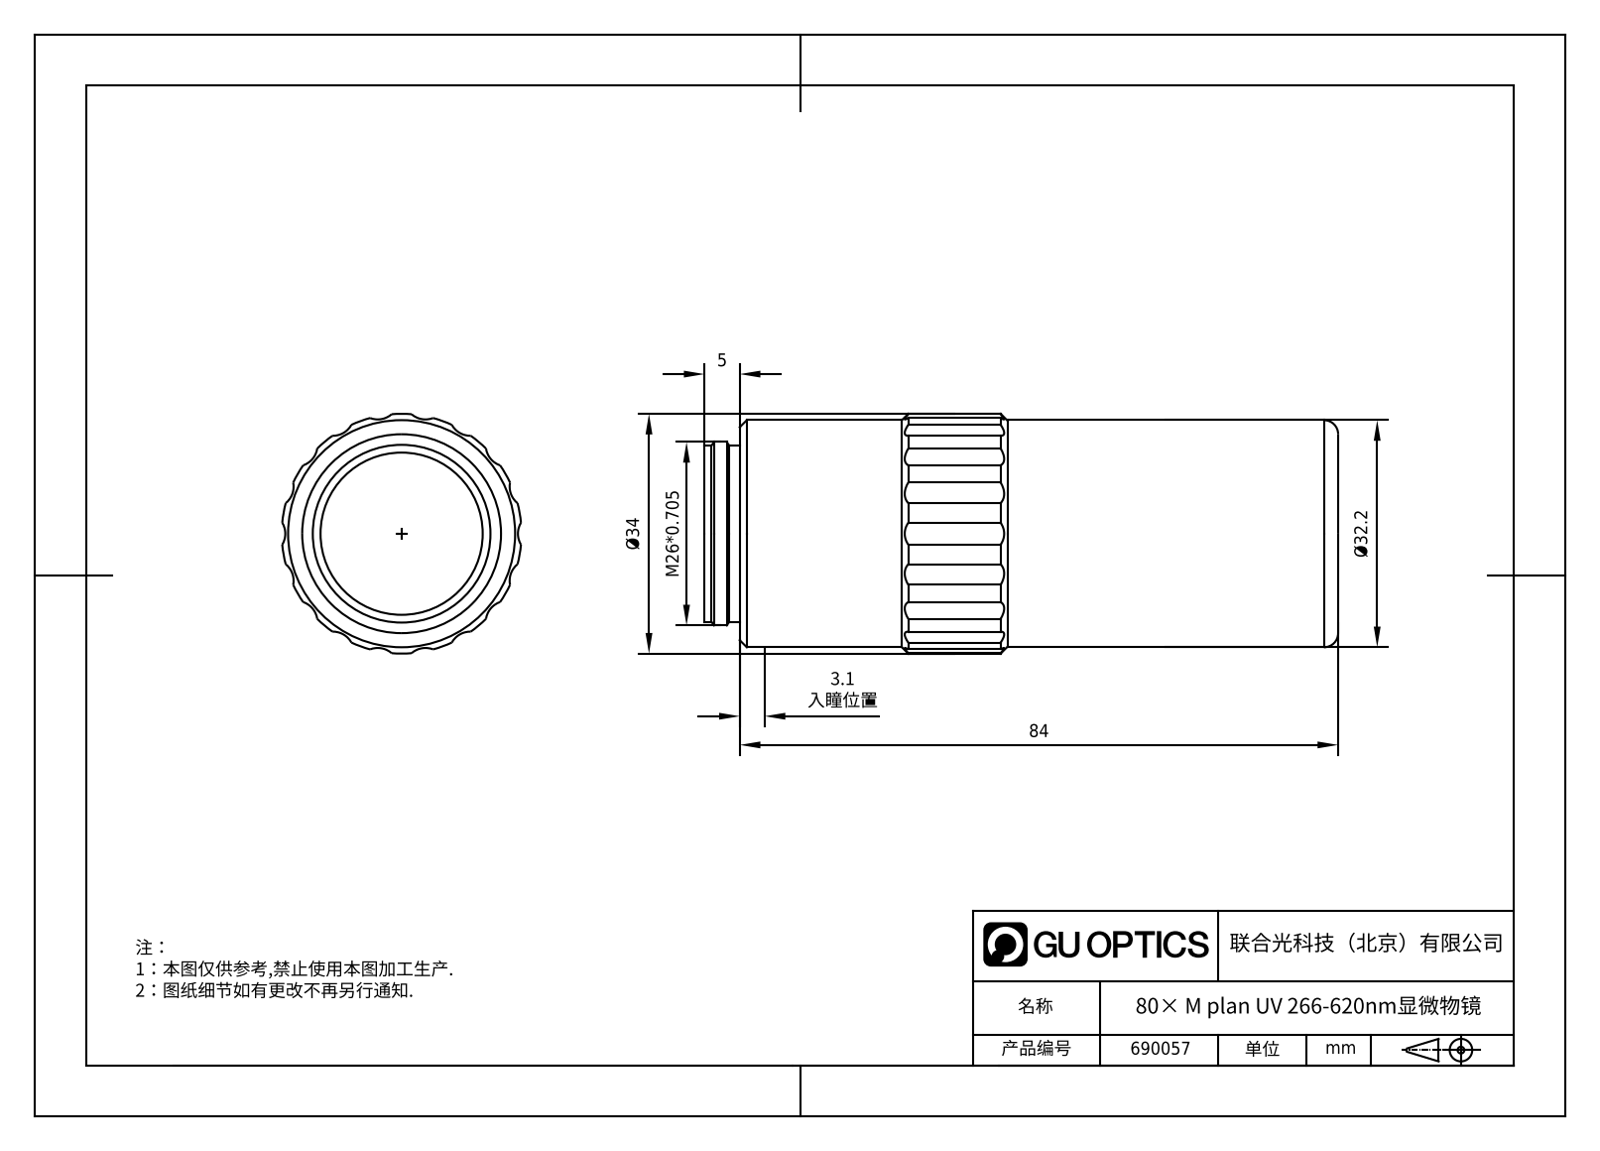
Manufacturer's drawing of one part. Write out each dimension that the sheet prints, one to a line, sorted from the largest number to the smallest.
84
Ø34
Ø32.2
M26*0.705
5
3.1 入瞳位置
